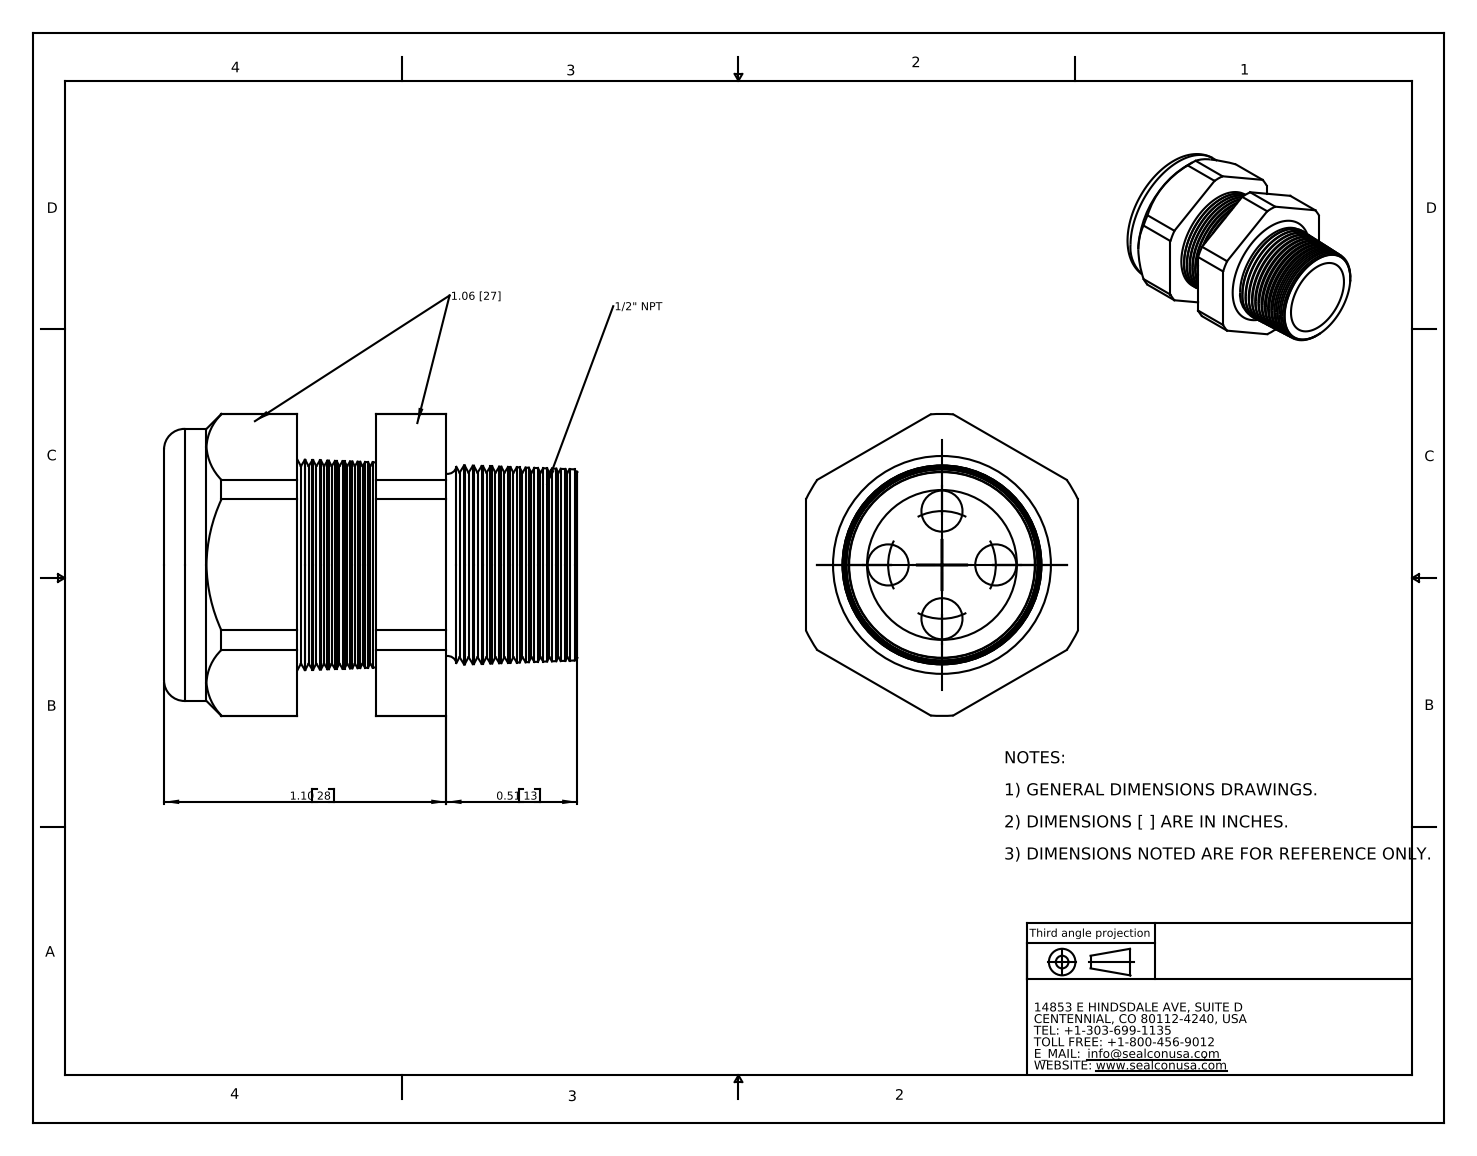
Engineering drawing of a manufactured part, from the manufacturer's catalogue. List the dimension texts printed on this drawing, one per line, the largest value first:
1.10 28
0.51 13
